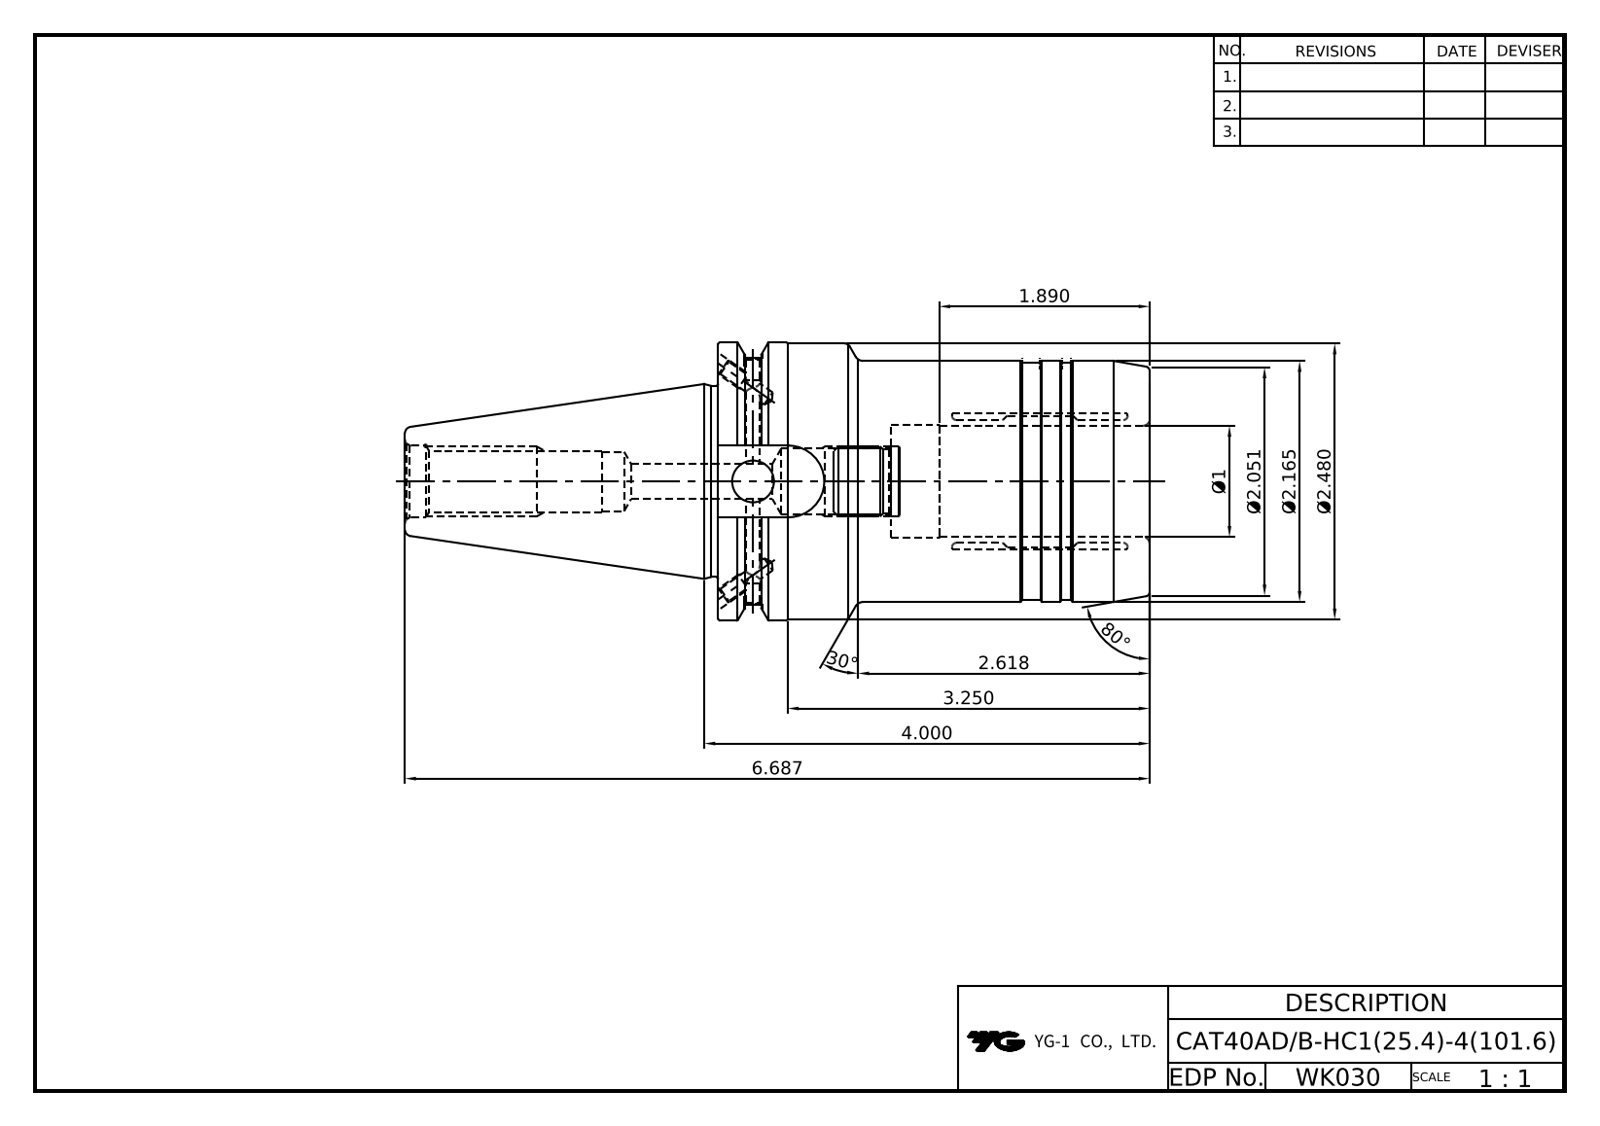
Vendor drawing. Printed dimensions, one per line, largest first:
80°
30°
6.687
4.000
3.250
2.618
Ø2.480
Ø2.165
Ø2.051
1.890
Ø1
